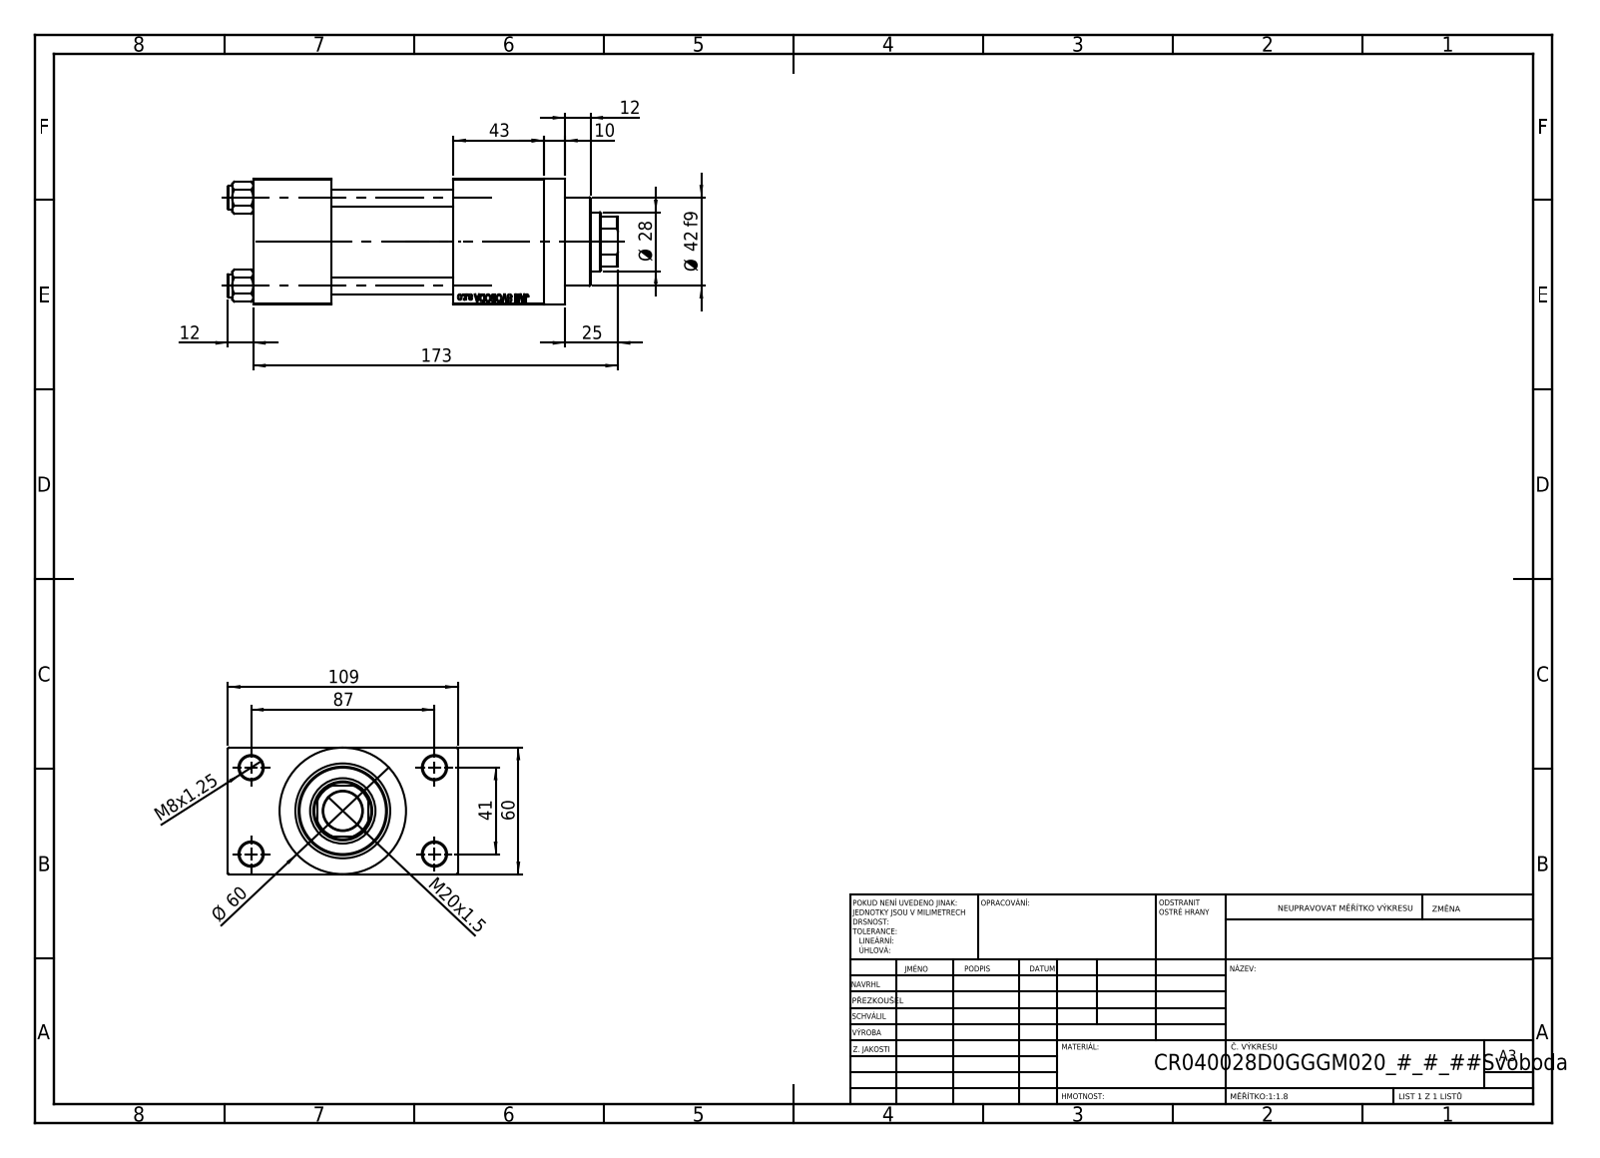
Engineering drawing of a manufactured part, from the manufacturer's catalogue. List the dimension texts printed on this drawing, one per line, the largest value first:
173
109
87
Ø 60
60
43
Ø 42 f9
41
Ø 28
25
M20x1.5
12
12
10
M8x1.25
